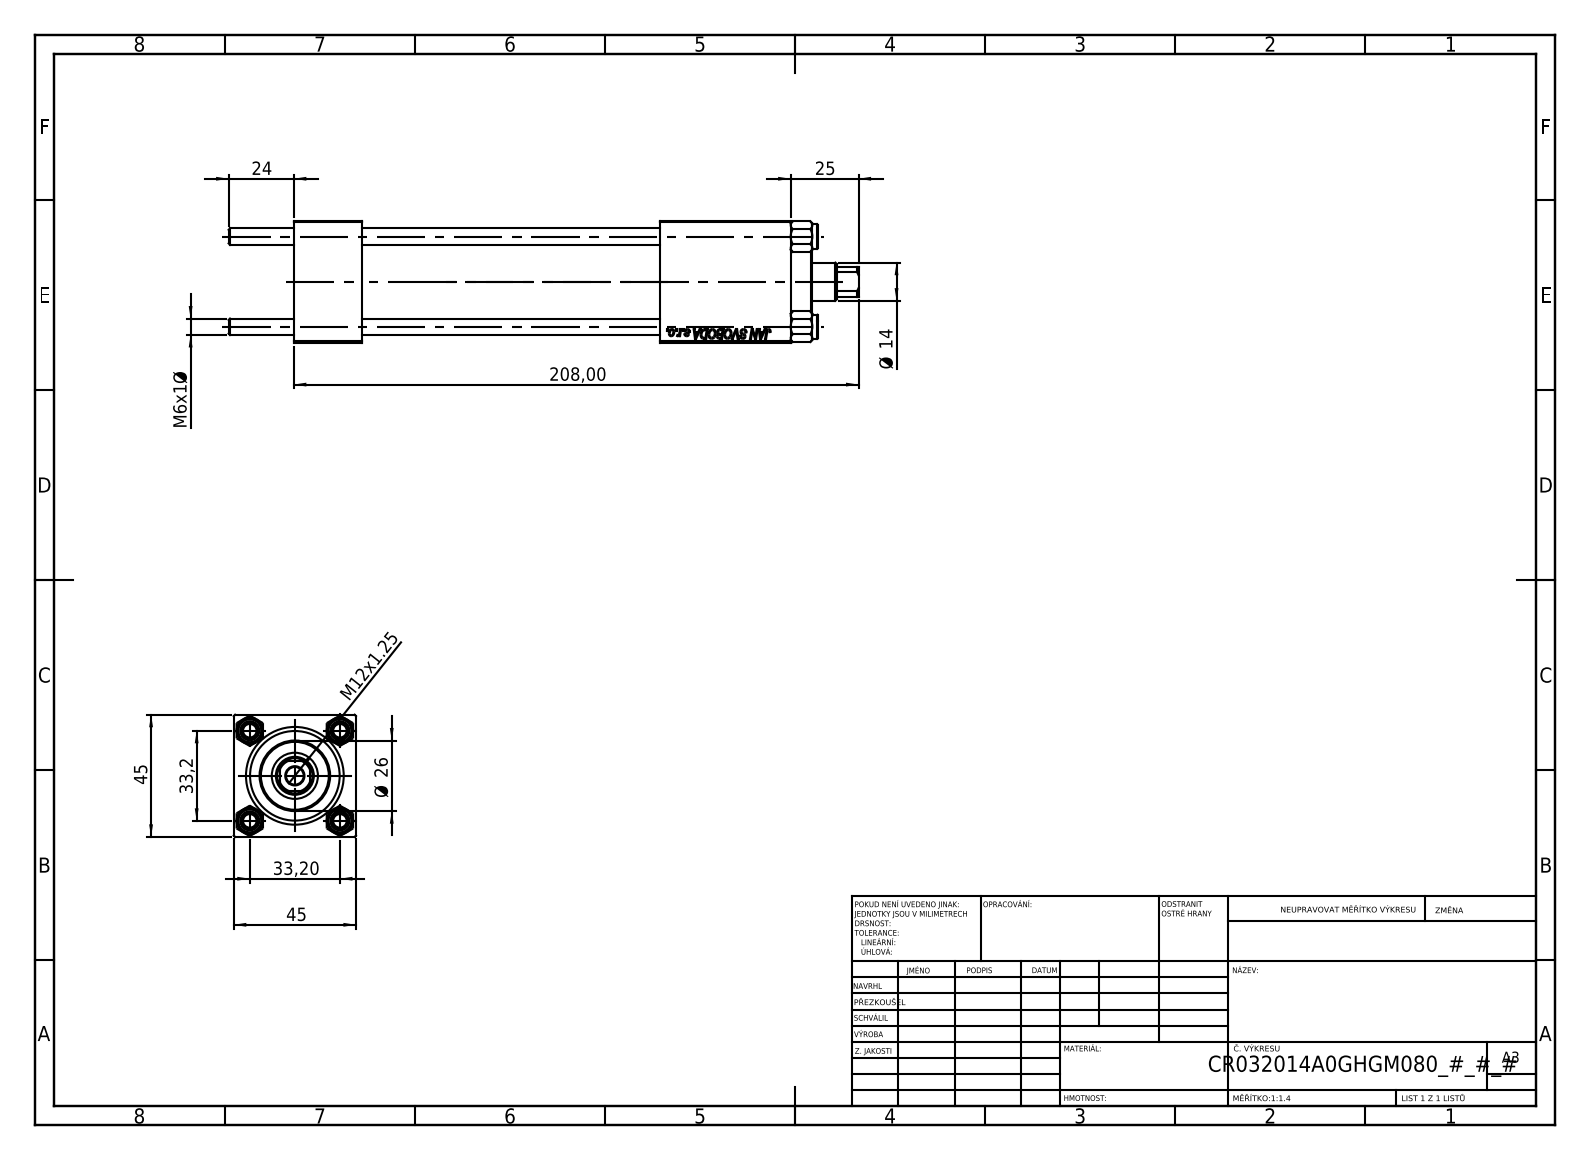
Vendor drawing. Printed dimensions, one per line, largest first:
208,00
45
45
33,2
33,20
Ø 26
25
24
Ø 14
M12x1.25
M6x1 Ø
